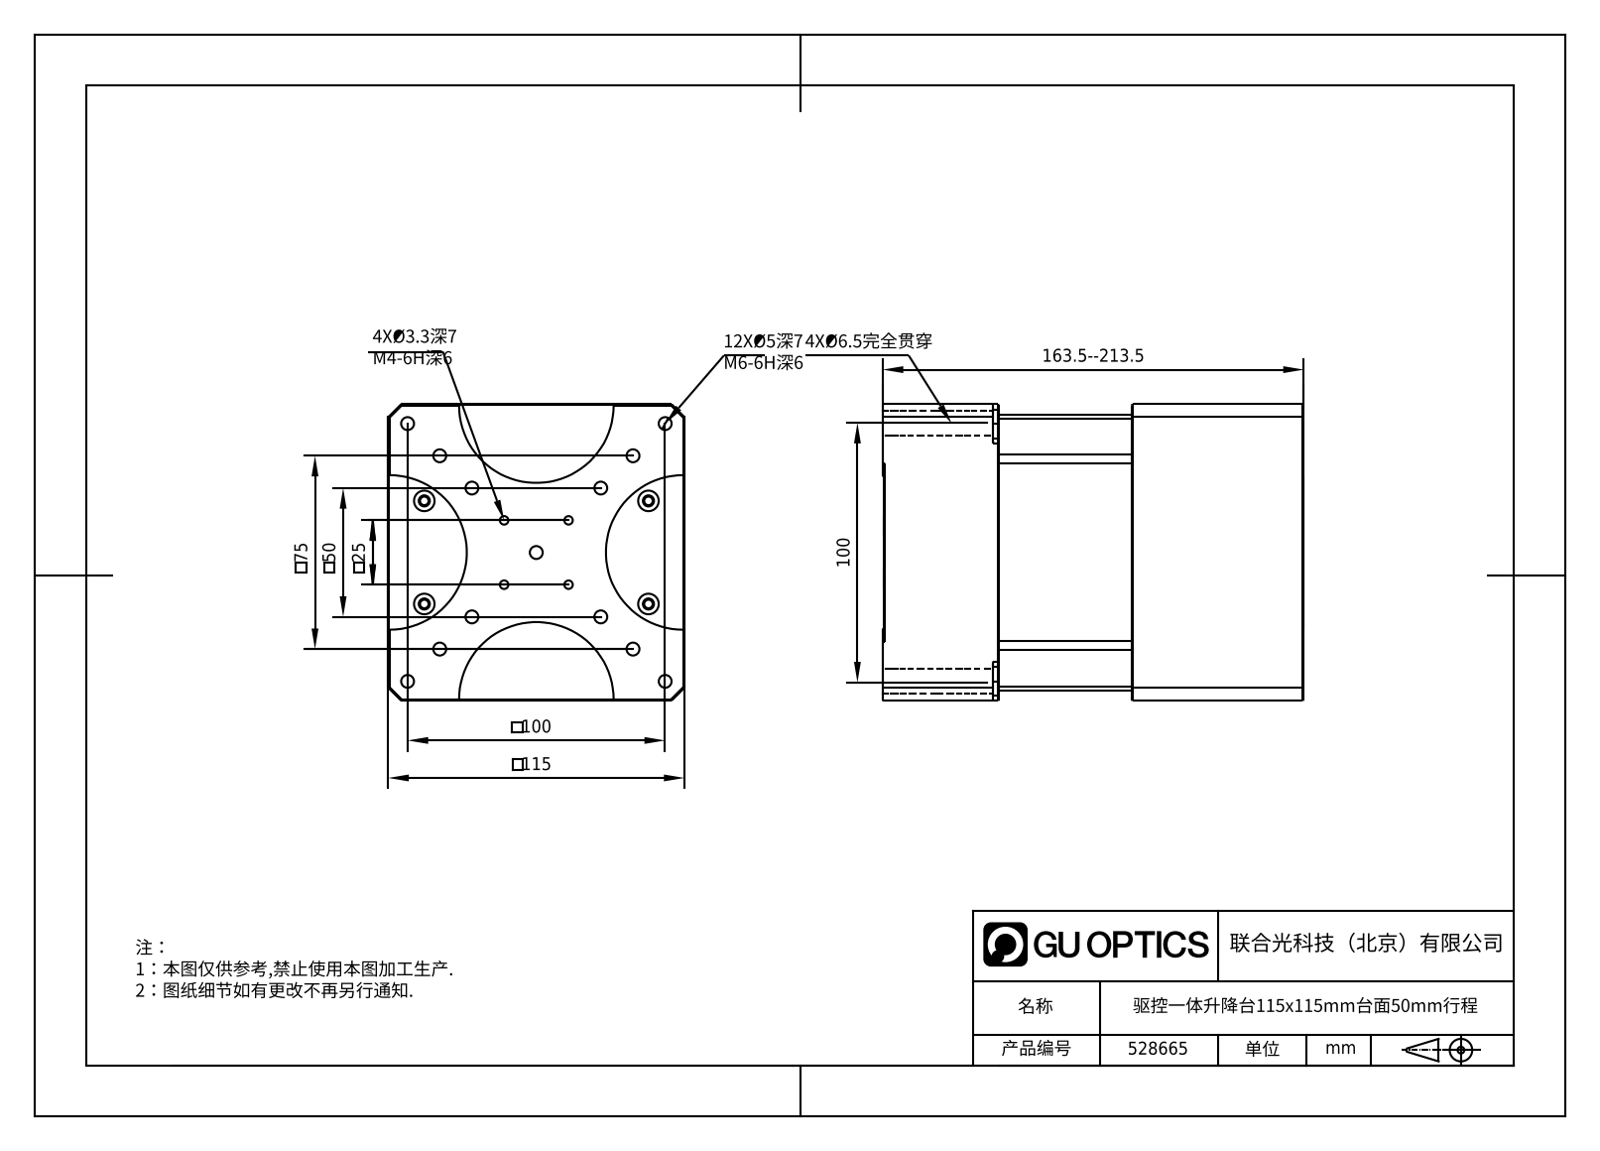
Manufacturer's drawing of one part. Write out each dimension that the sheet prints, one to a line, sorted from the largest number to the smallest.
163.5--213.5
115
100
100
75
50
25
